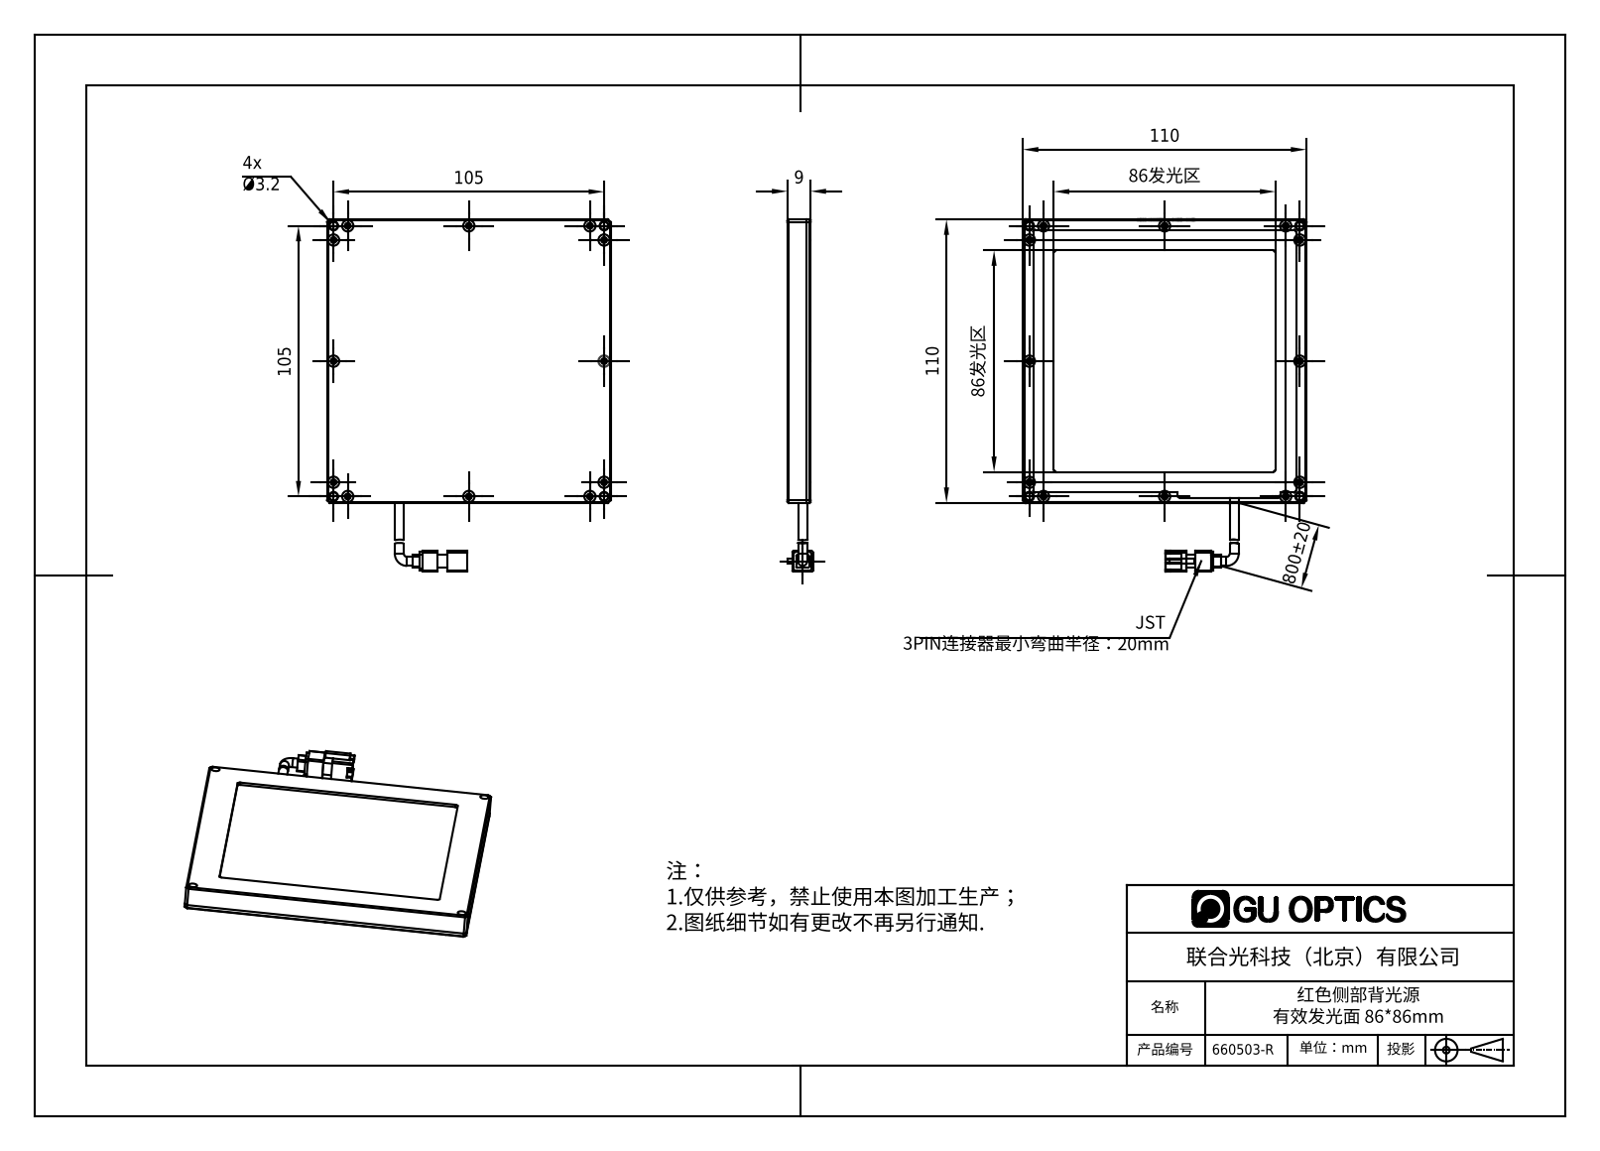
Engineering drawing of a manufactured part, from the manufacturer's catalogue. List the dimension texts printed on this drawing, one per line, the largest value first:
800±20
110
110
105
105
86发光区
86发光区
9
